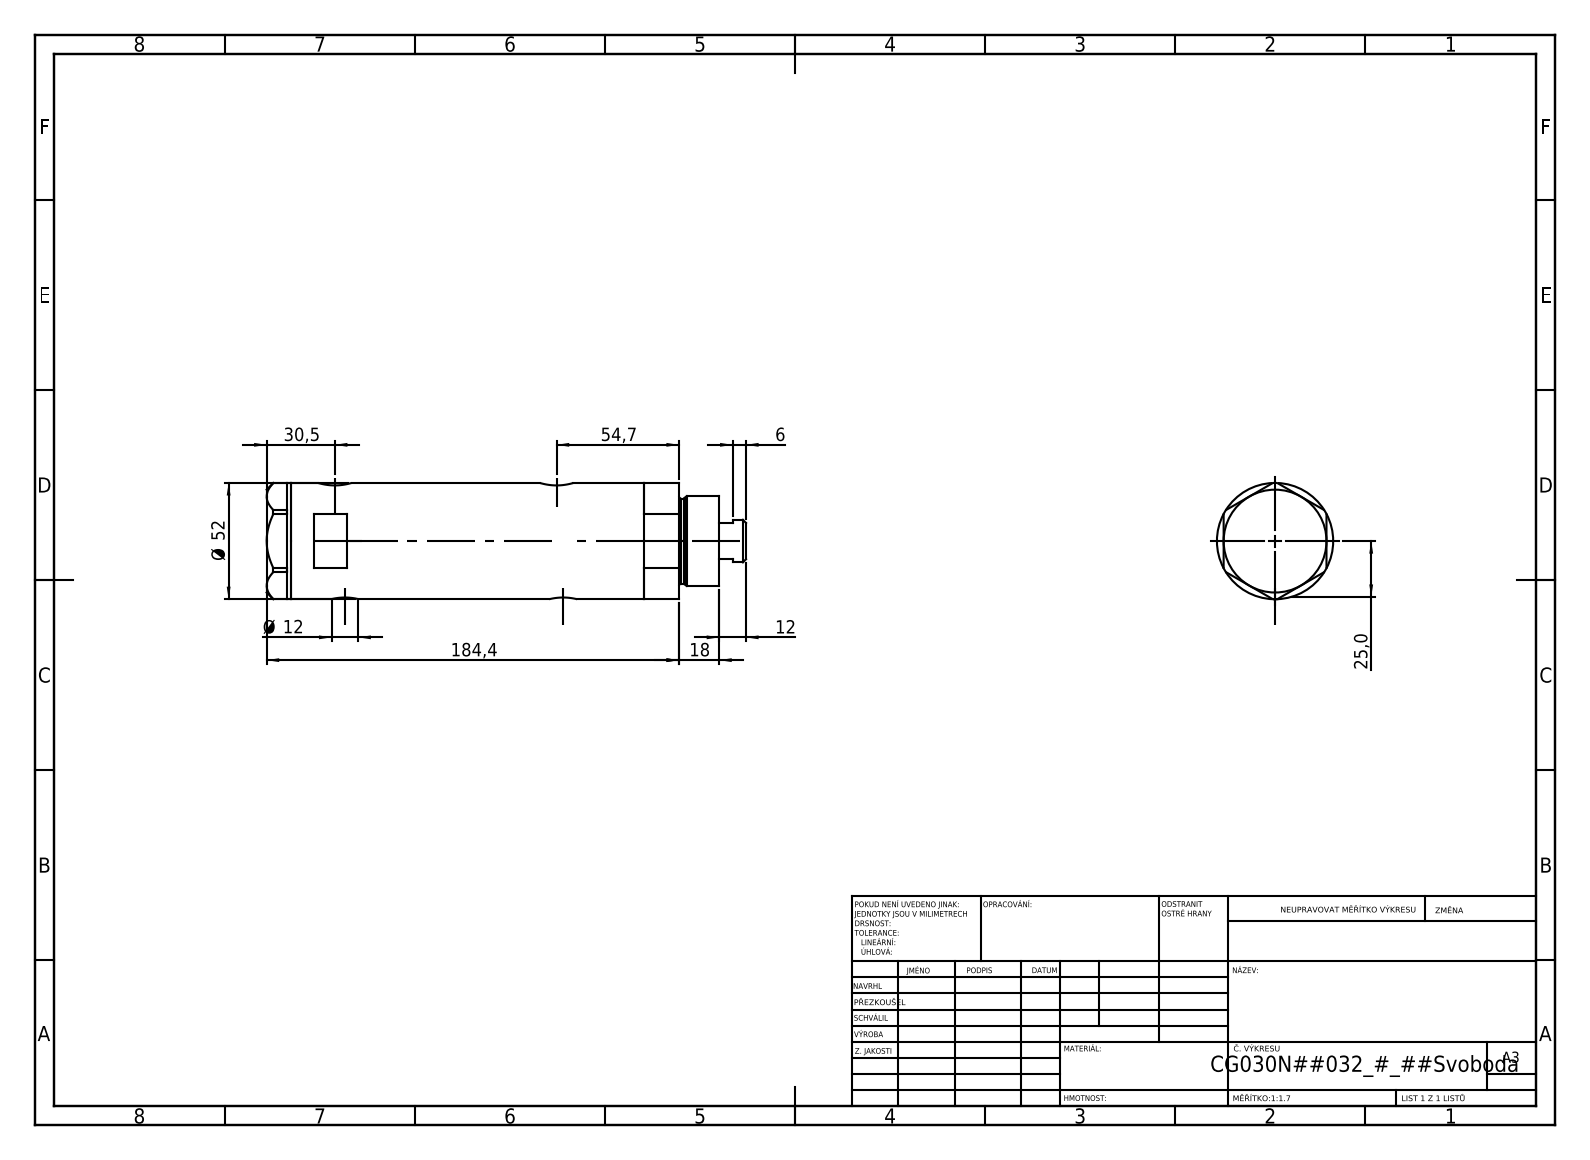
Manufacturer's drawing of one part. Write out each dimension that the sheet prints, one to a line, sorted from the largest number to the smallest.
184,4
54,7
Ø 52
30,5
25,0
18
12
Ø 12
6
